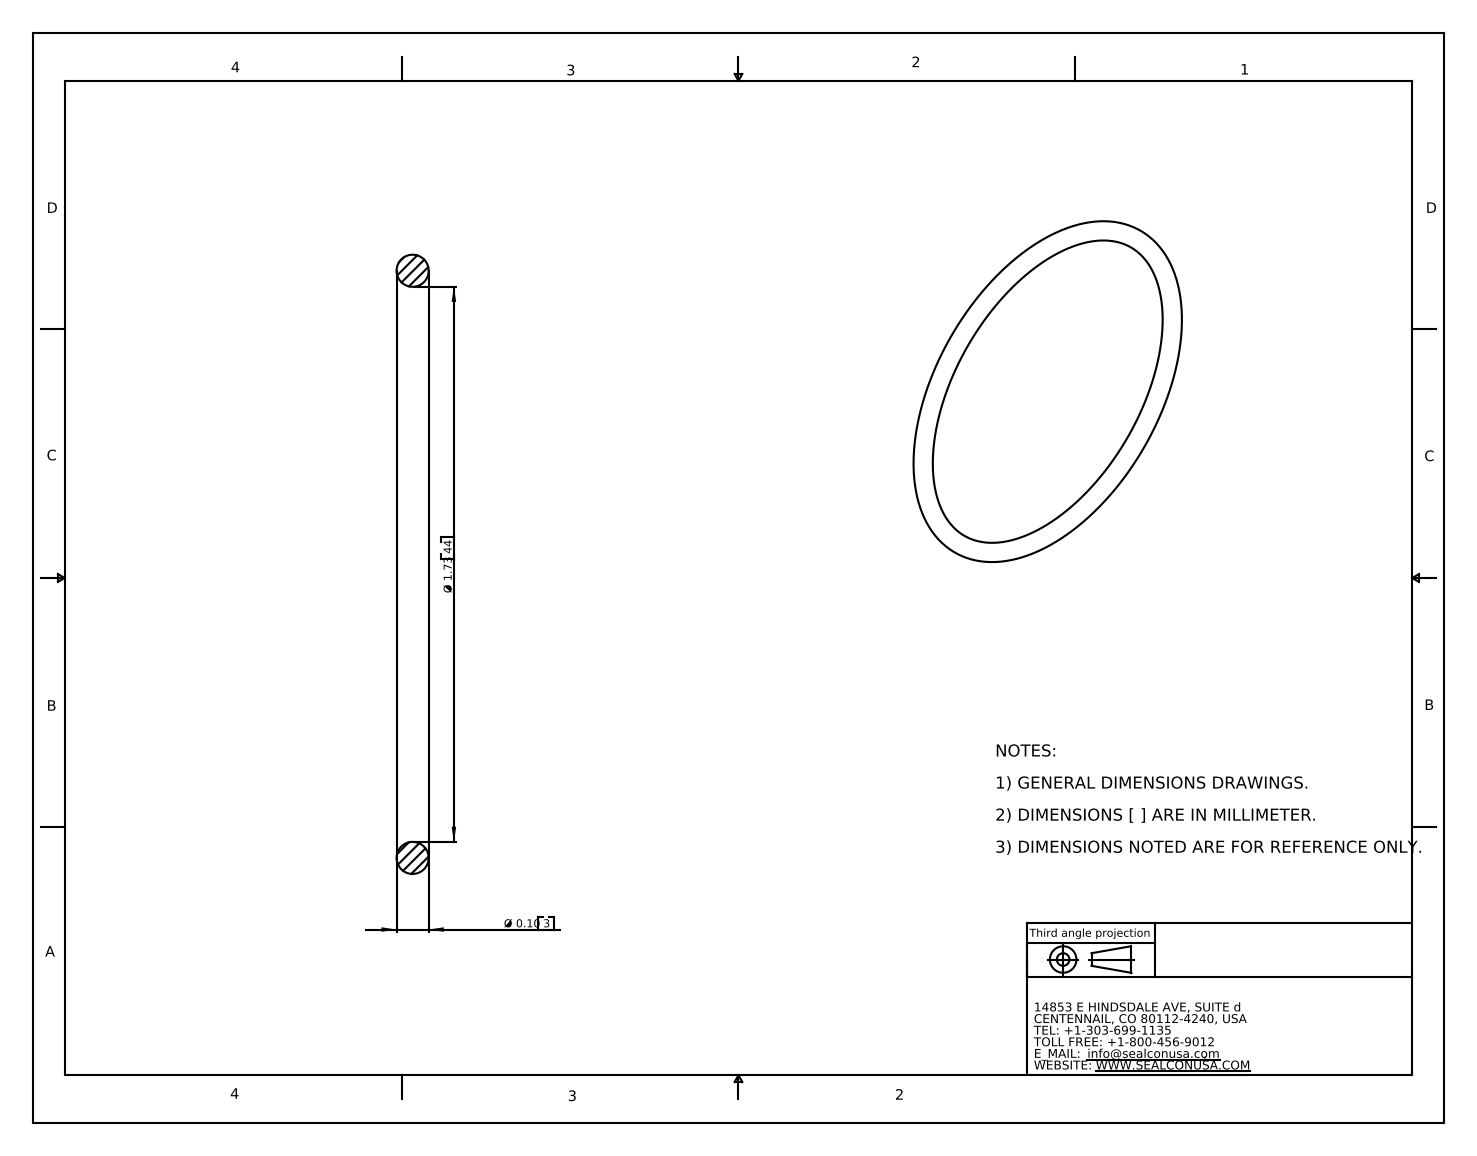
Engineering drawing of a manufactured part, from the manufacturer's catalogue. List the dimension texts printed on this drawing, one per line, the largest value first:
Ø 1.73 44
Ø 0.10 3
